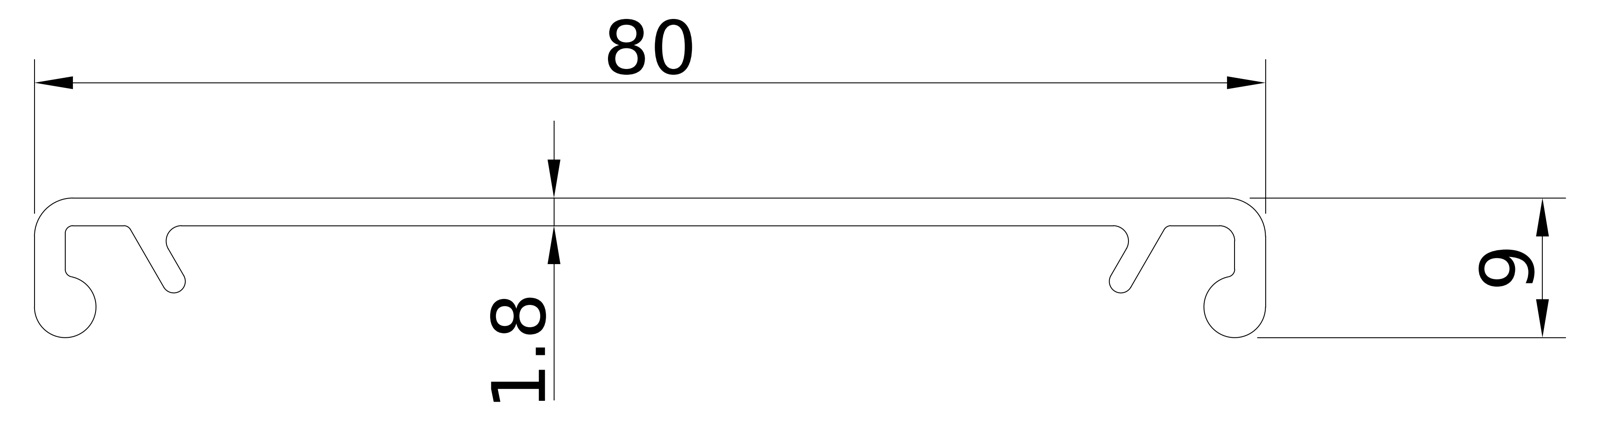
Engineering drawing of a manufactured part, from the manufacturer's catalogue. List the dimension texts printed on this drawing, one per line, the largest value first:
80
9
1.8
